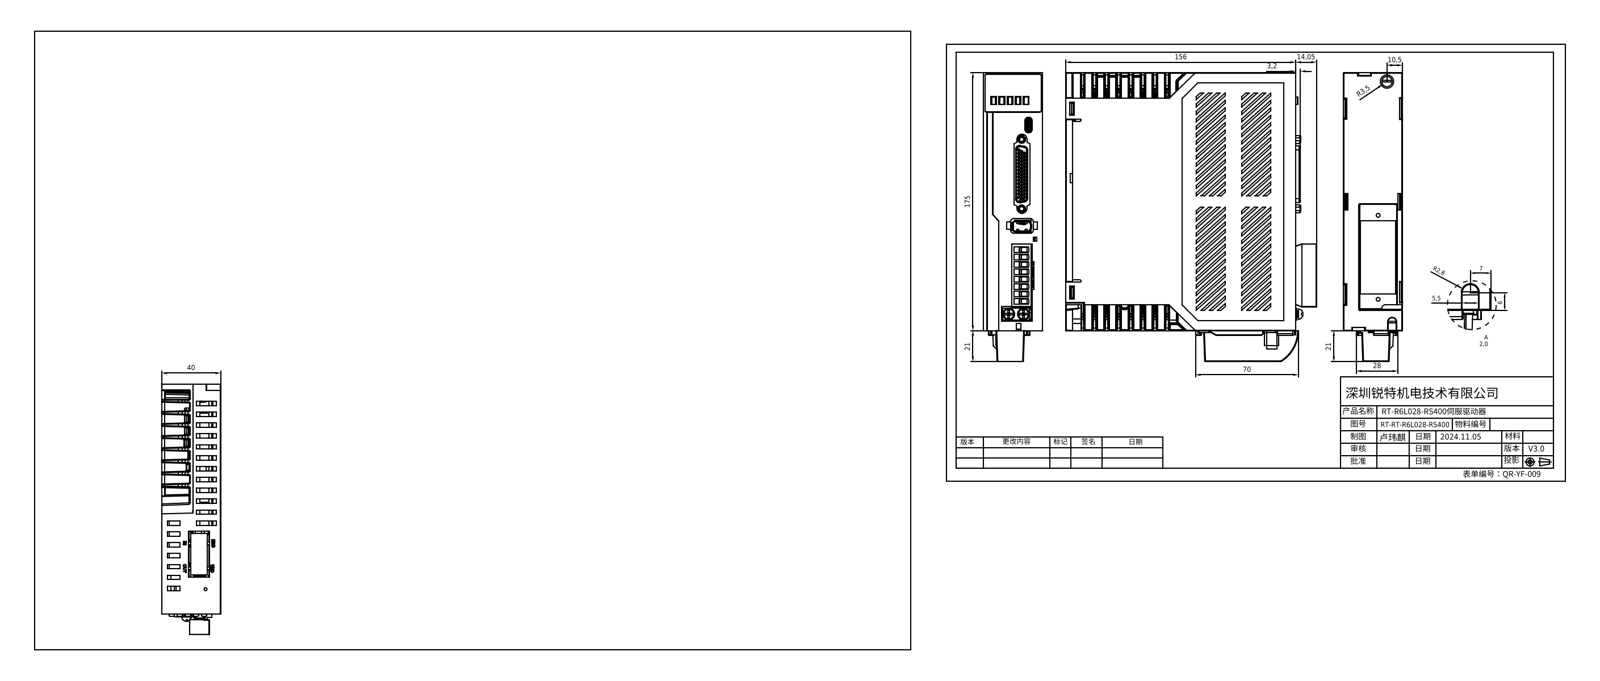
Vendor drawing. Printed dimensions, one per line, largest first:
175
156
70
40
28
21
21
14,05
10,5
7
6
5,5
R3,5
3,2
R2,8
